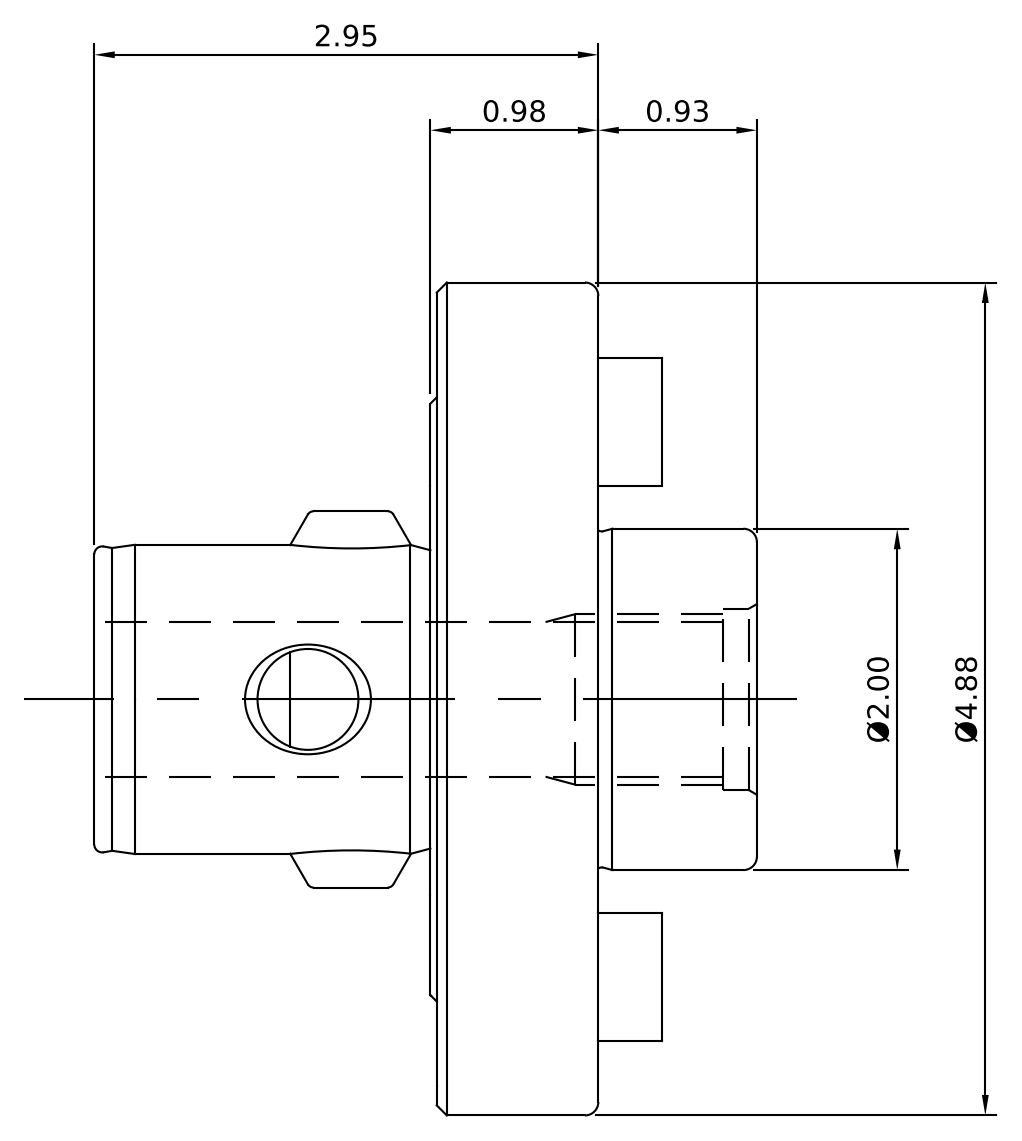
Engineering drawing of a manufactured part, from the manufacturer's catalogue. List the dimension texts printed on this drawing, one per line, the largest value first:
Ø4.88
2.95
Ø2.00
0.98
0.93
